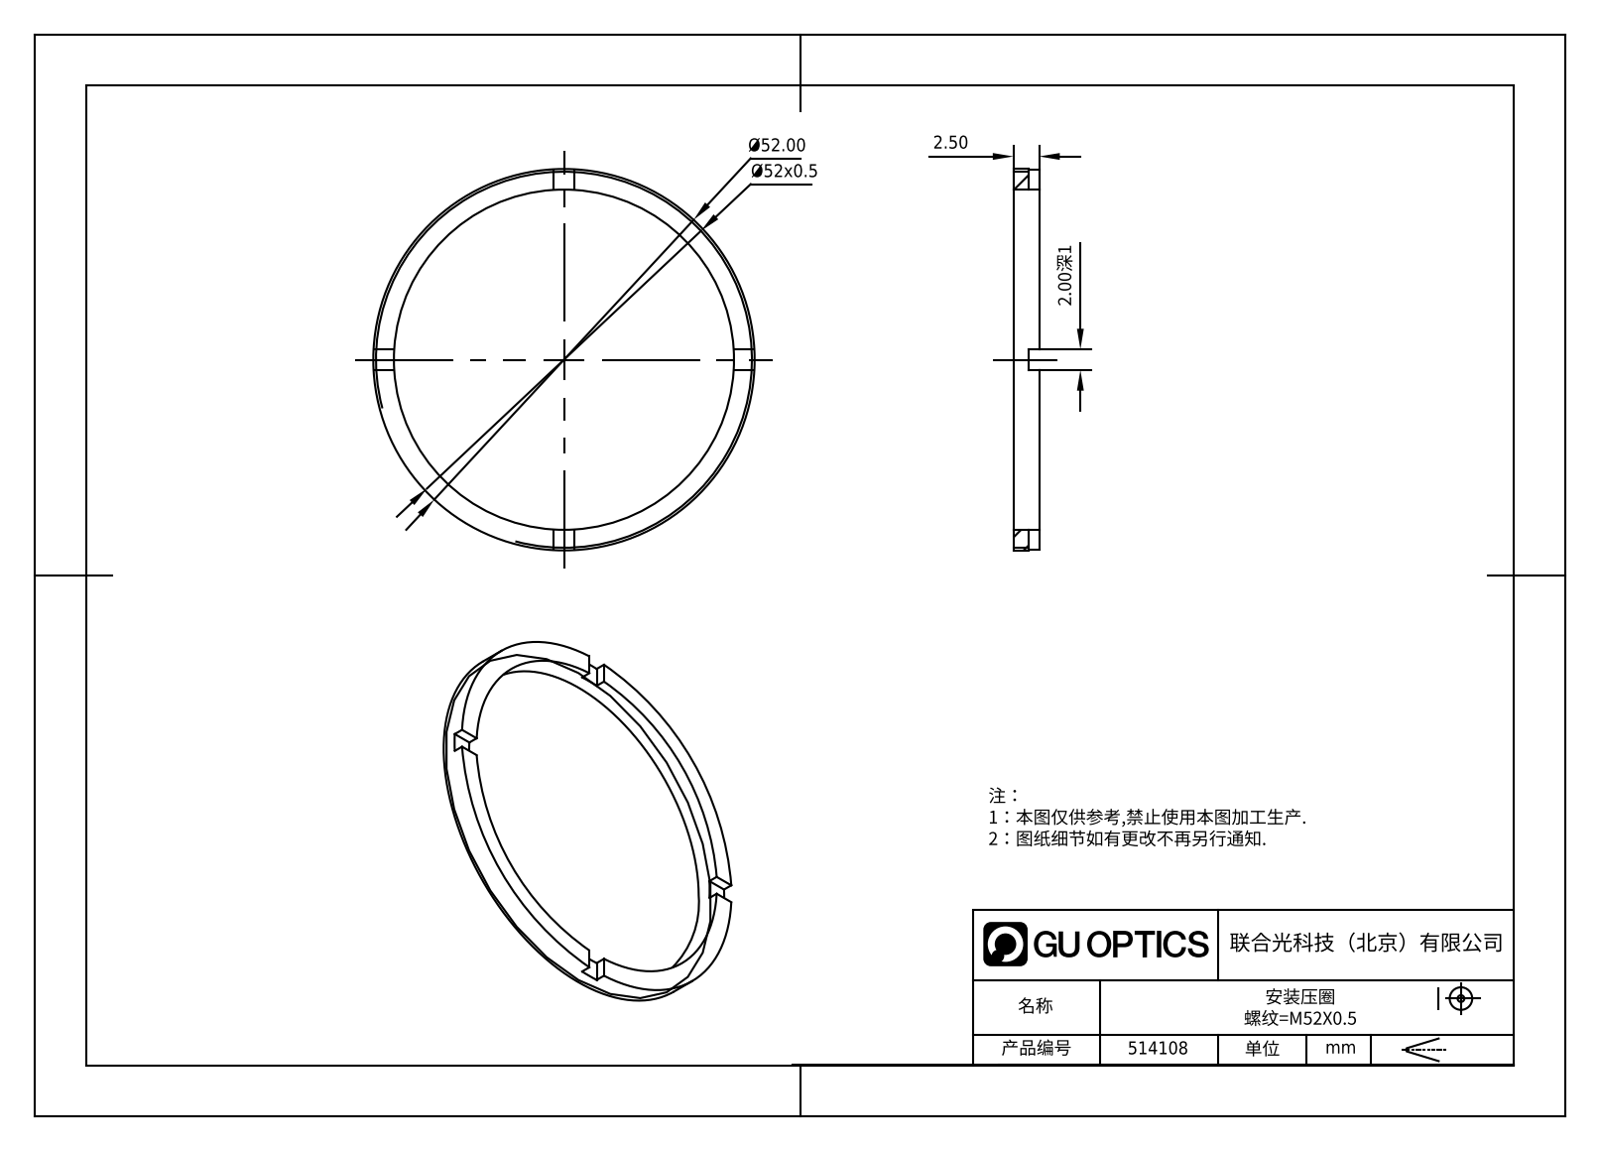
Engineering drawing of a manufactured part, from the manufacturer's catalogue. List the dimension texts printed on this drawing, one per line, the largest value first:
Ø52.00
Ø52x0.5
2.50
2.00深1
